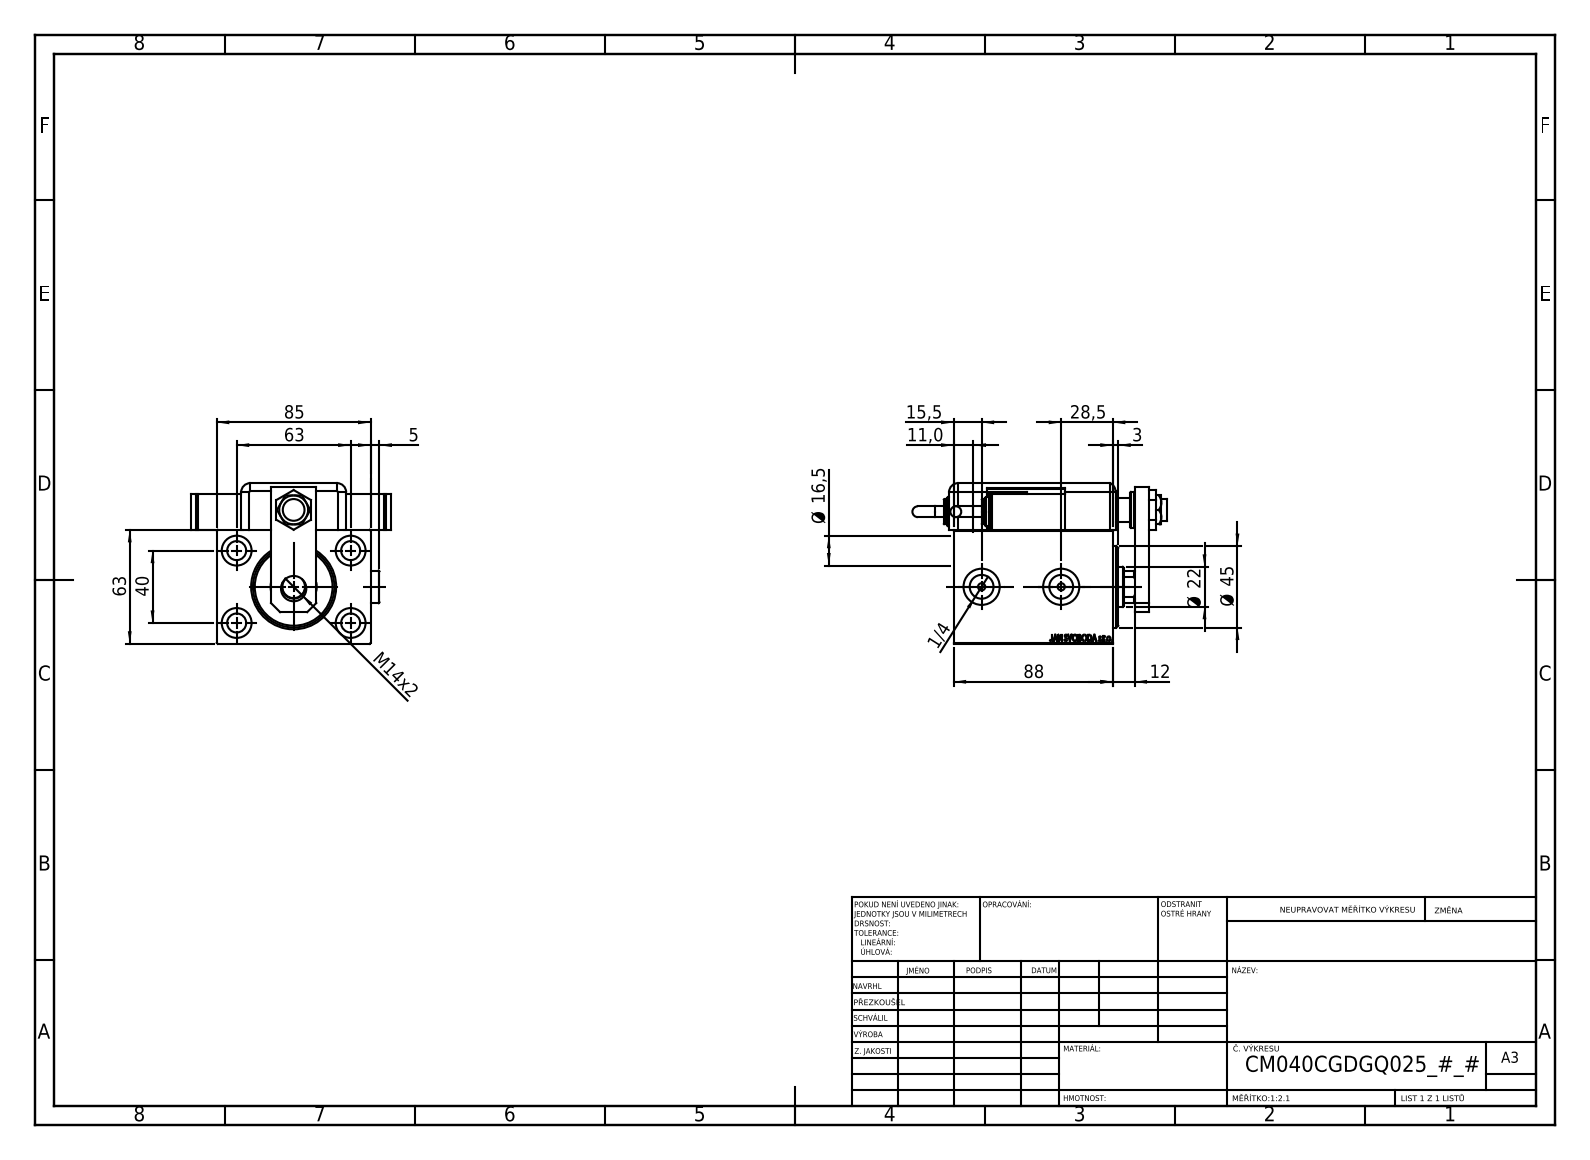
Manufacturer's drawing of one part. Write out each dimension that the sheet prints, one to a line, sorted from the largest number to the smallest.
88
85
63
63
Ø 45
40
28,5
Ø 22
Ø 16,5
15,5
M14x2
12
11,0
5
3
1/4
